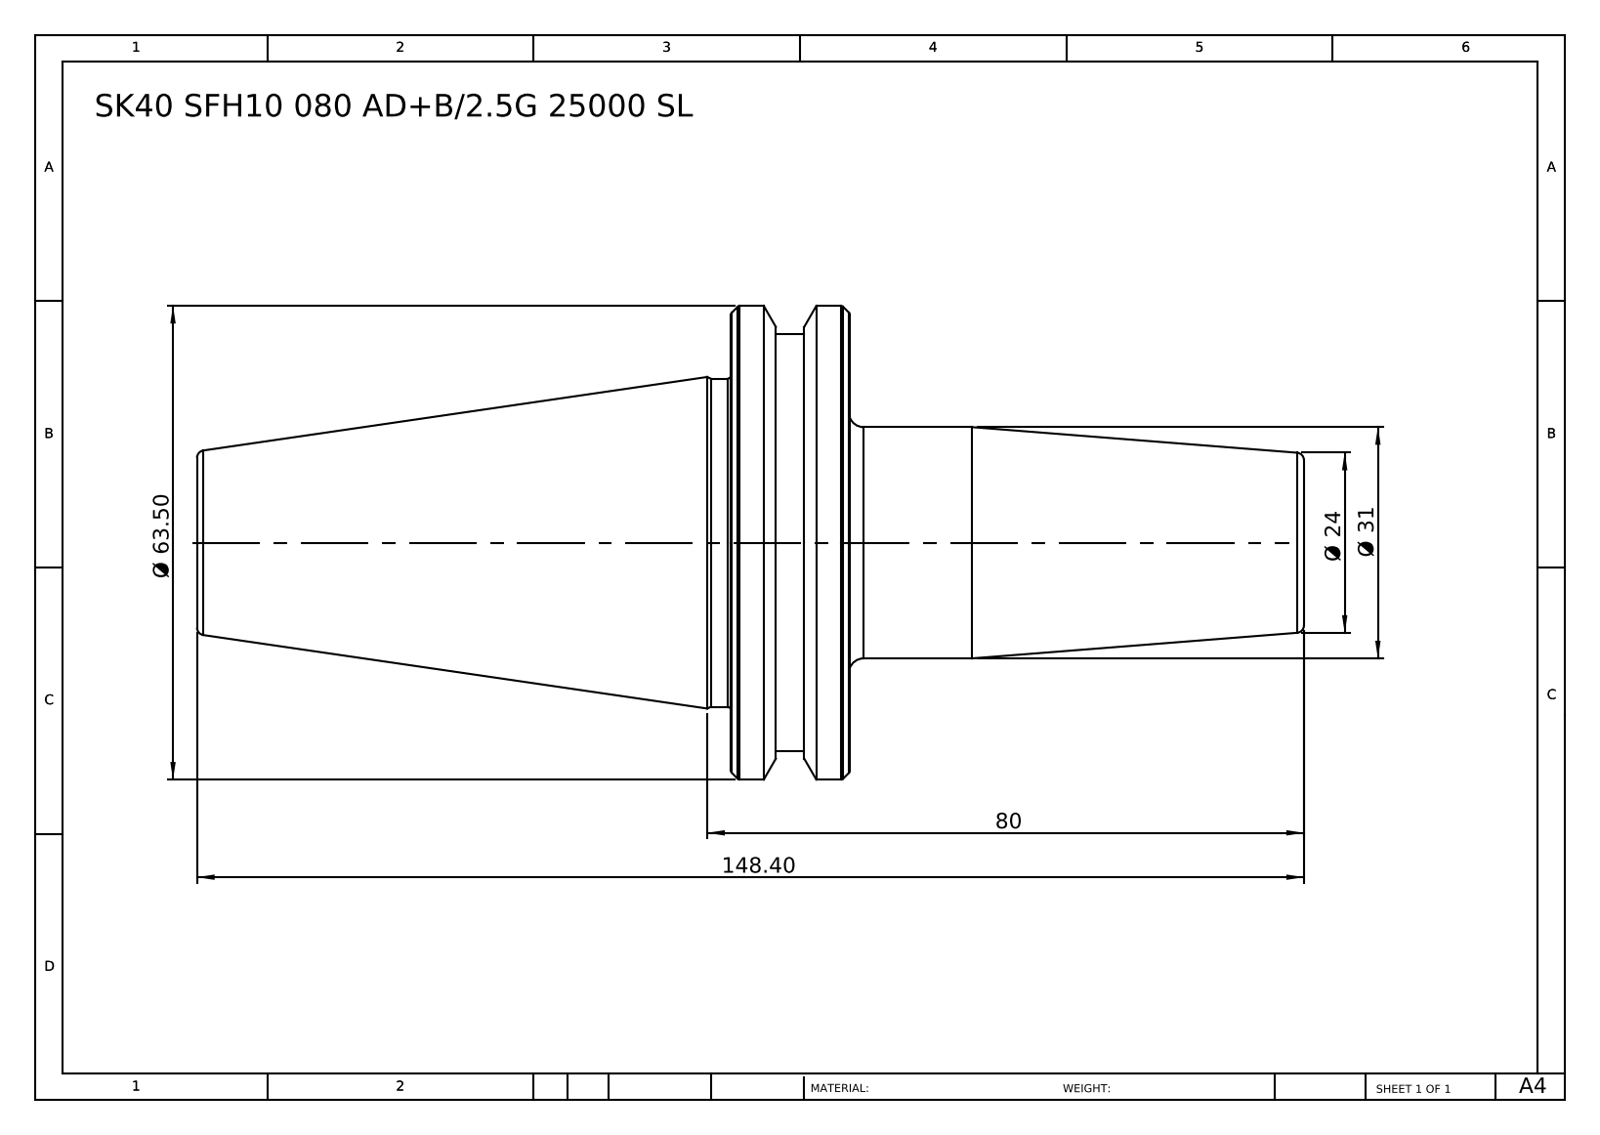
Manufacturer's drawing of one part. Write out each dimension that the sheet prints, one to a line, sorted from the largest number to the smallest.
148.40
80
Ø 63.50
Ø 31
Ø 24
